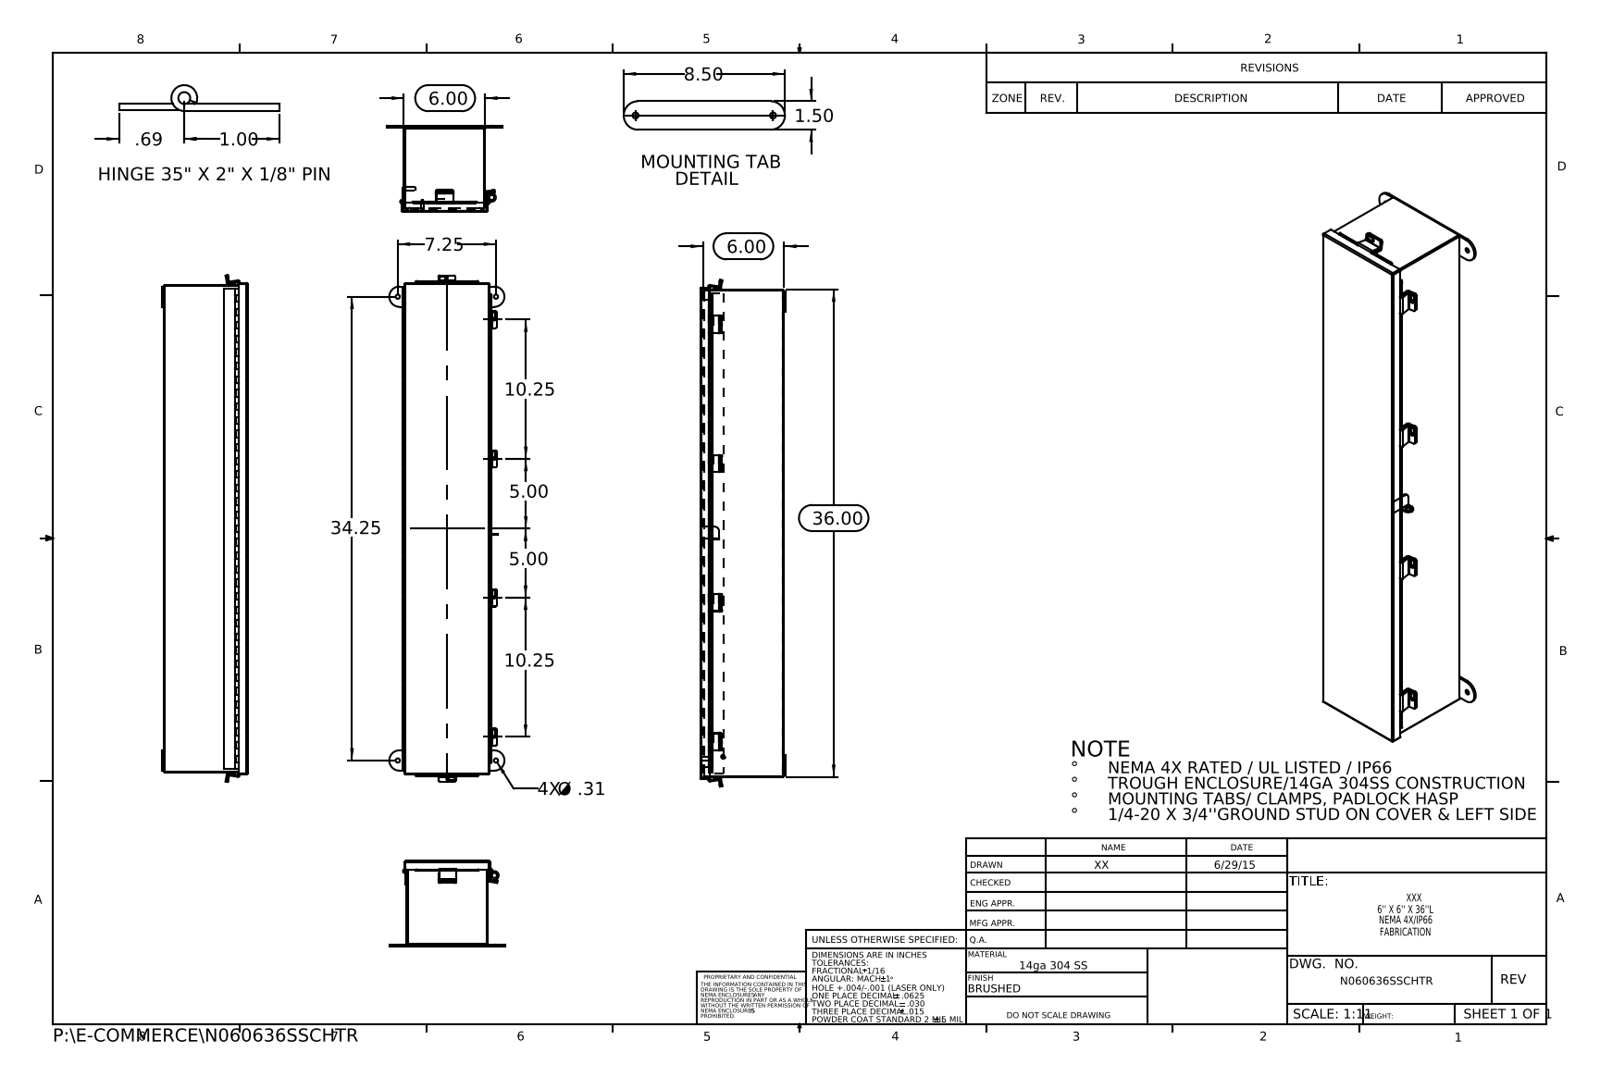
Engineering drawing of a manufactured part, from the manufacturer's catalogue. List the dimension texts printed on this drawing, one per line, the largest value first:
36.00
34.25
10.25
10.25
8.50
7.25
6.00
6.00
5.00
5.00
1.50
1.00
.69
4X Ø .31
